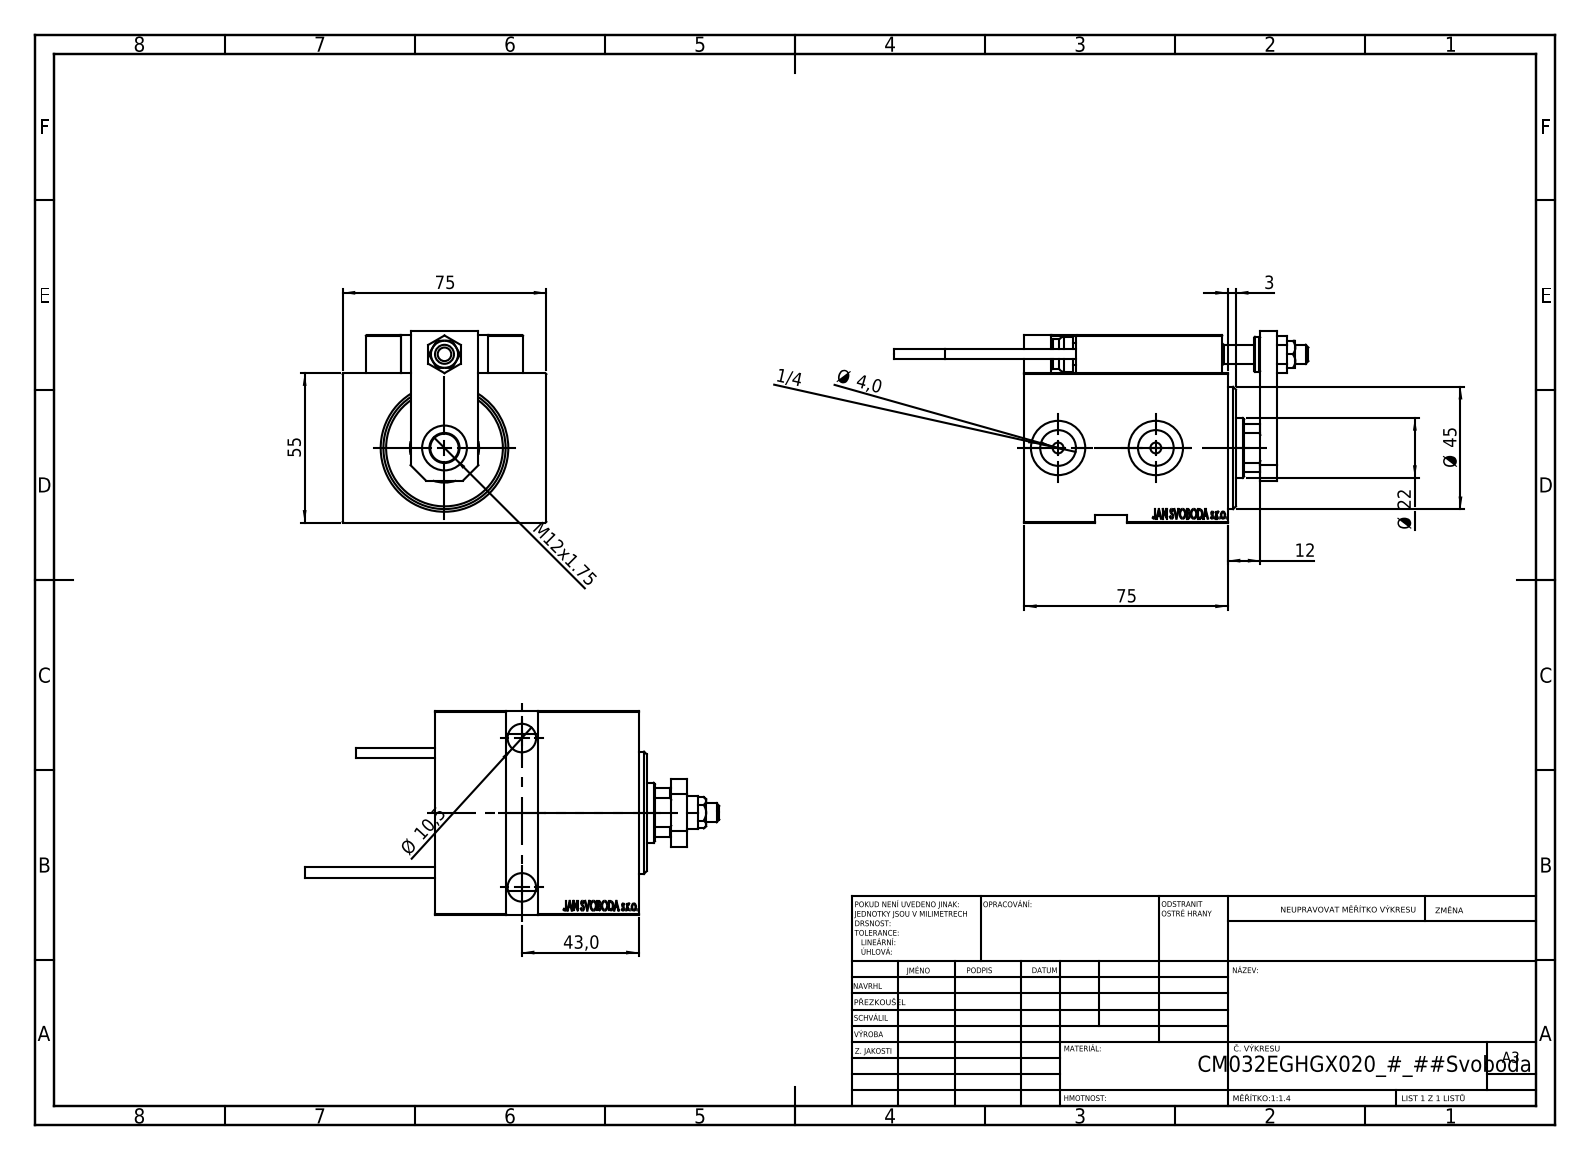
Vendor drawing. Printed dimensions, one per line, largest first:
75
75
55
Ø 45
43,0
Ø 22
M12x1.75
12
Ø 10,5
Ø 4,0
3
1/4
